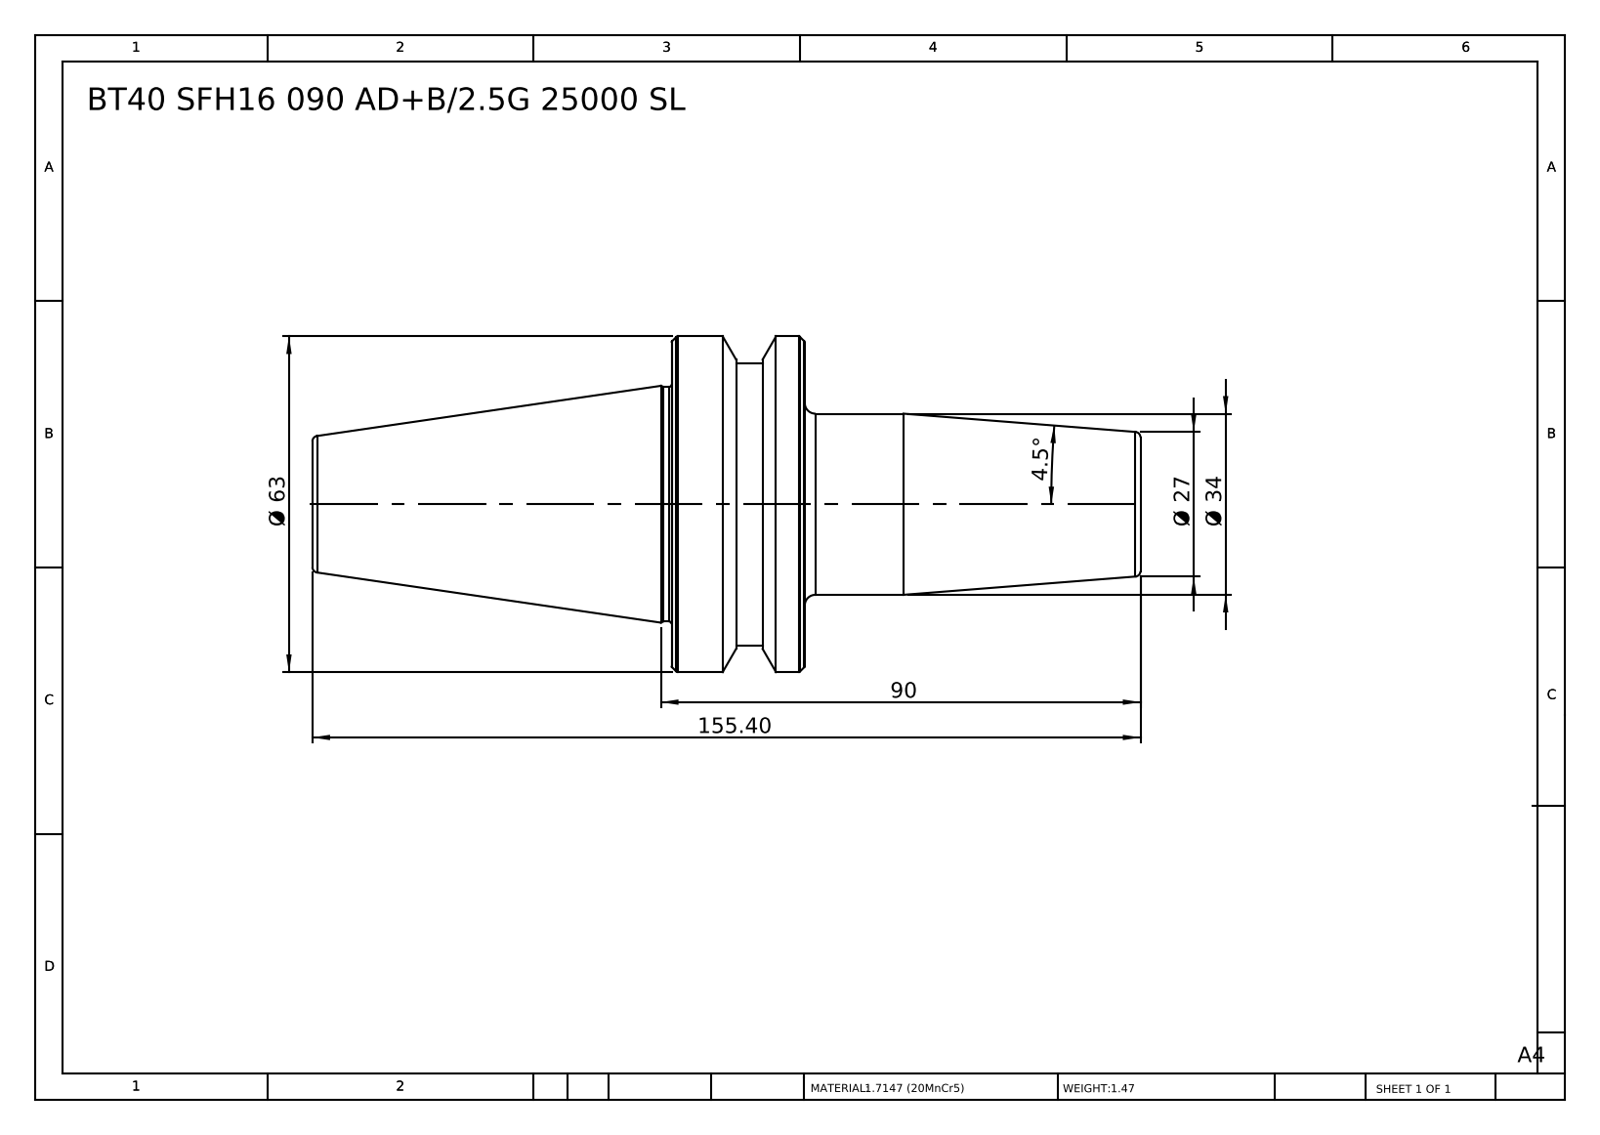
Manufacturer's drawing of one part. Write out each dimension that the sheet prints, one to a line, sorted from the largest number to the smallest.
155.40
90
Ø 63
Ø 34
Ø 27
4.5°
